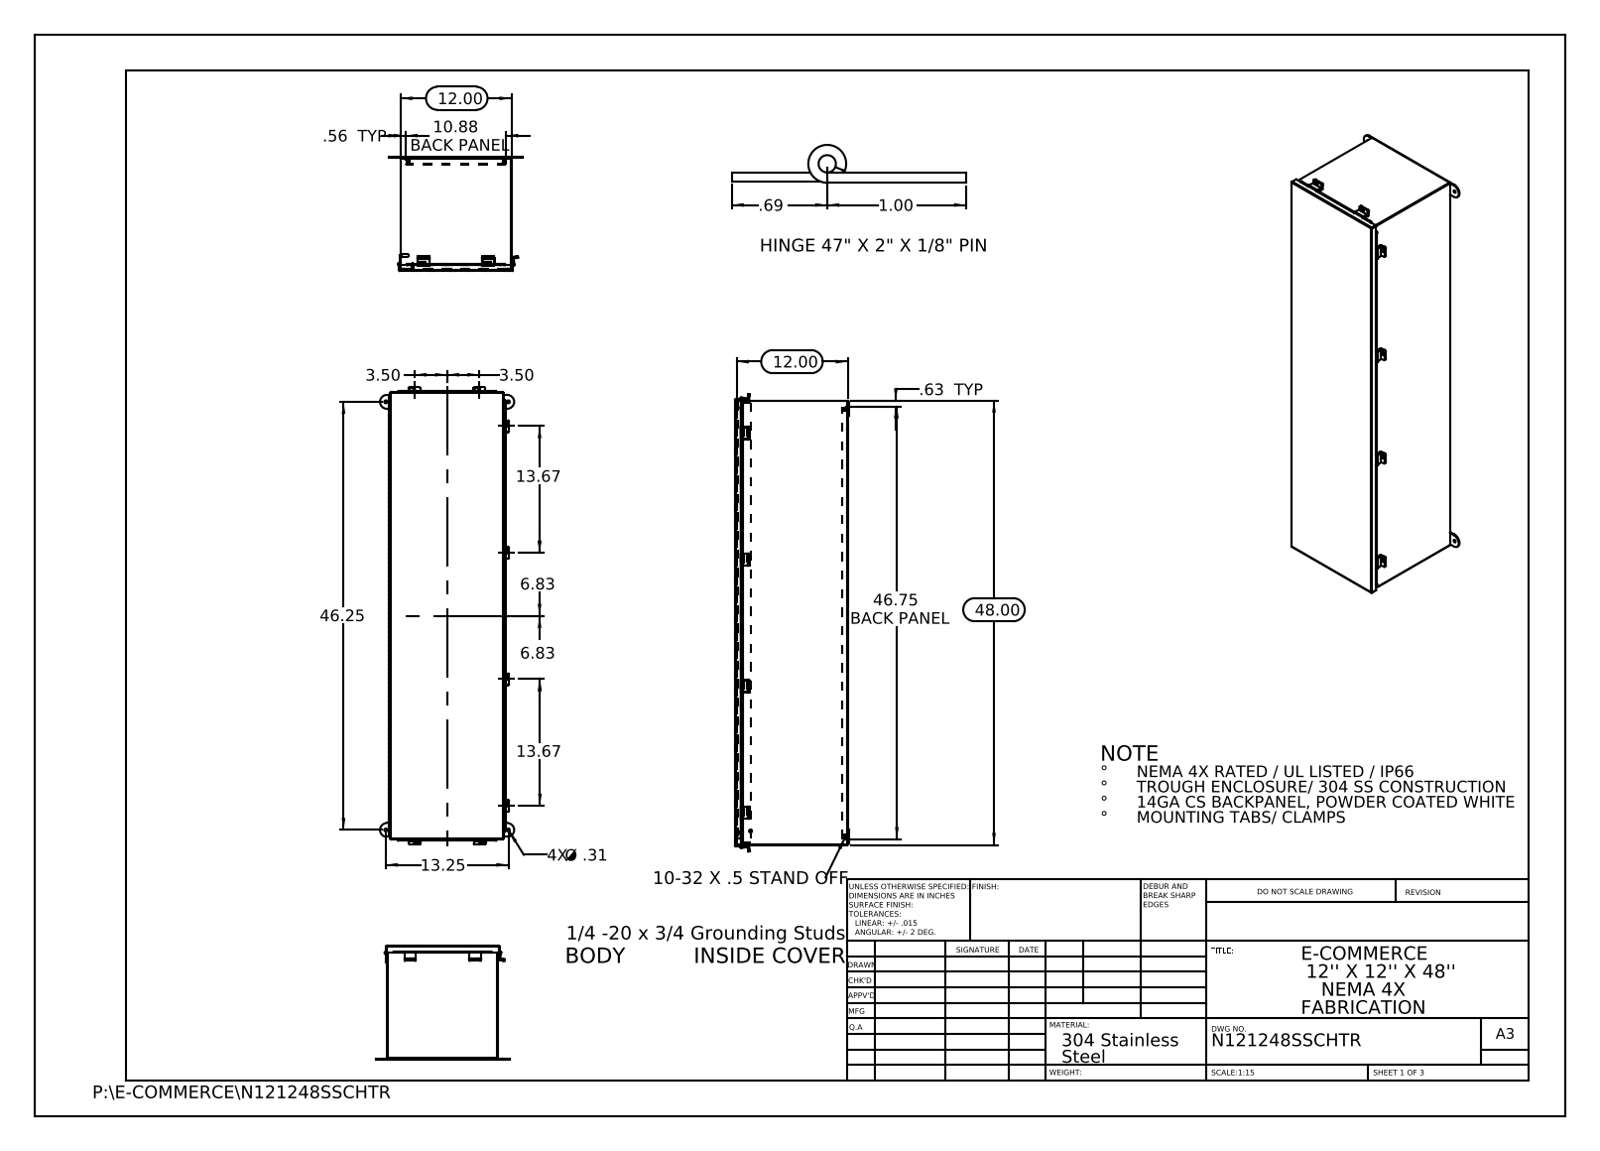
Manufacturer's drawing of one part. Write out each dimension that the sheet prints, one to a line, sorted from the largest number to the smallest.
48.00
46.75 BACK PANEL
46.25
13.67
13.67
13.25
12.00
12.00
10.88 BACK PANEL
6.83
6.83
3.50
3.50
1.00
.69
.63 TYP
.56 TYP
4X Ø .31
